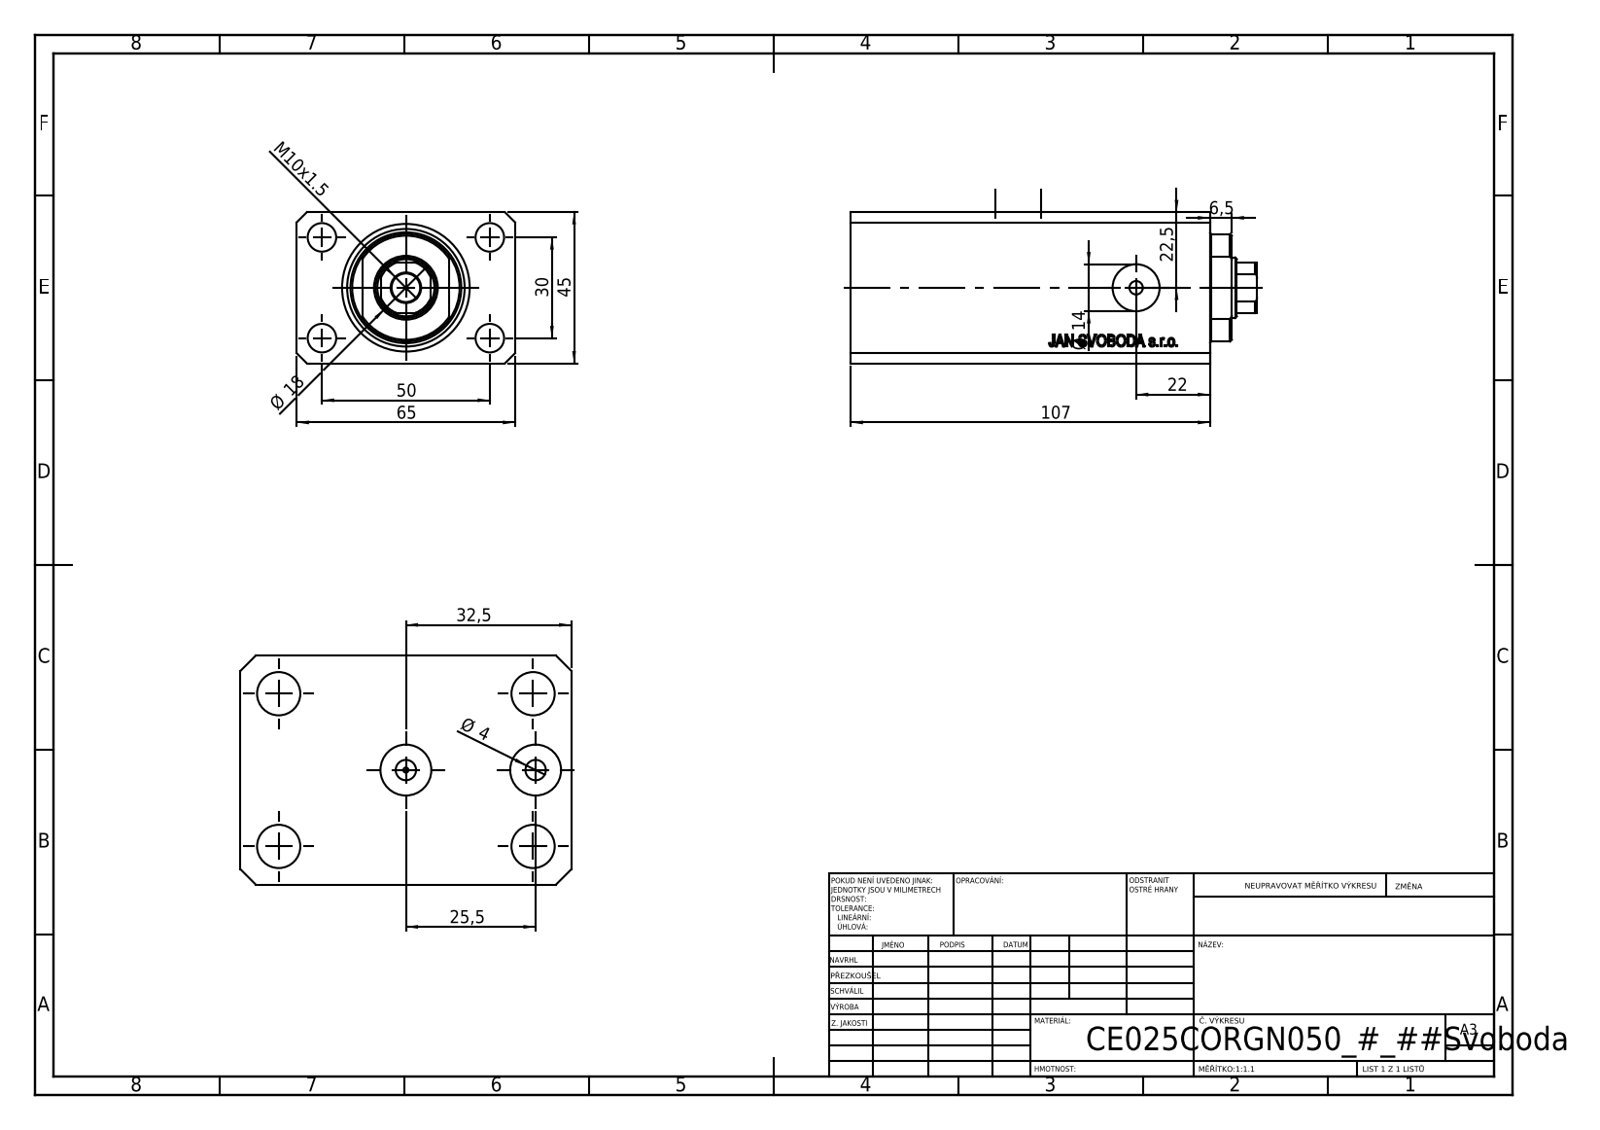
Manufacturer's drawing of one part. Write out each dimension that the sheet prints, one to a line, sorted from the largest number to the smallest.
107
65
50
45
32,5
30
25,5
22,5
22
Ø 18
Ø 14
M10x1.5
6,5
Ø 4
